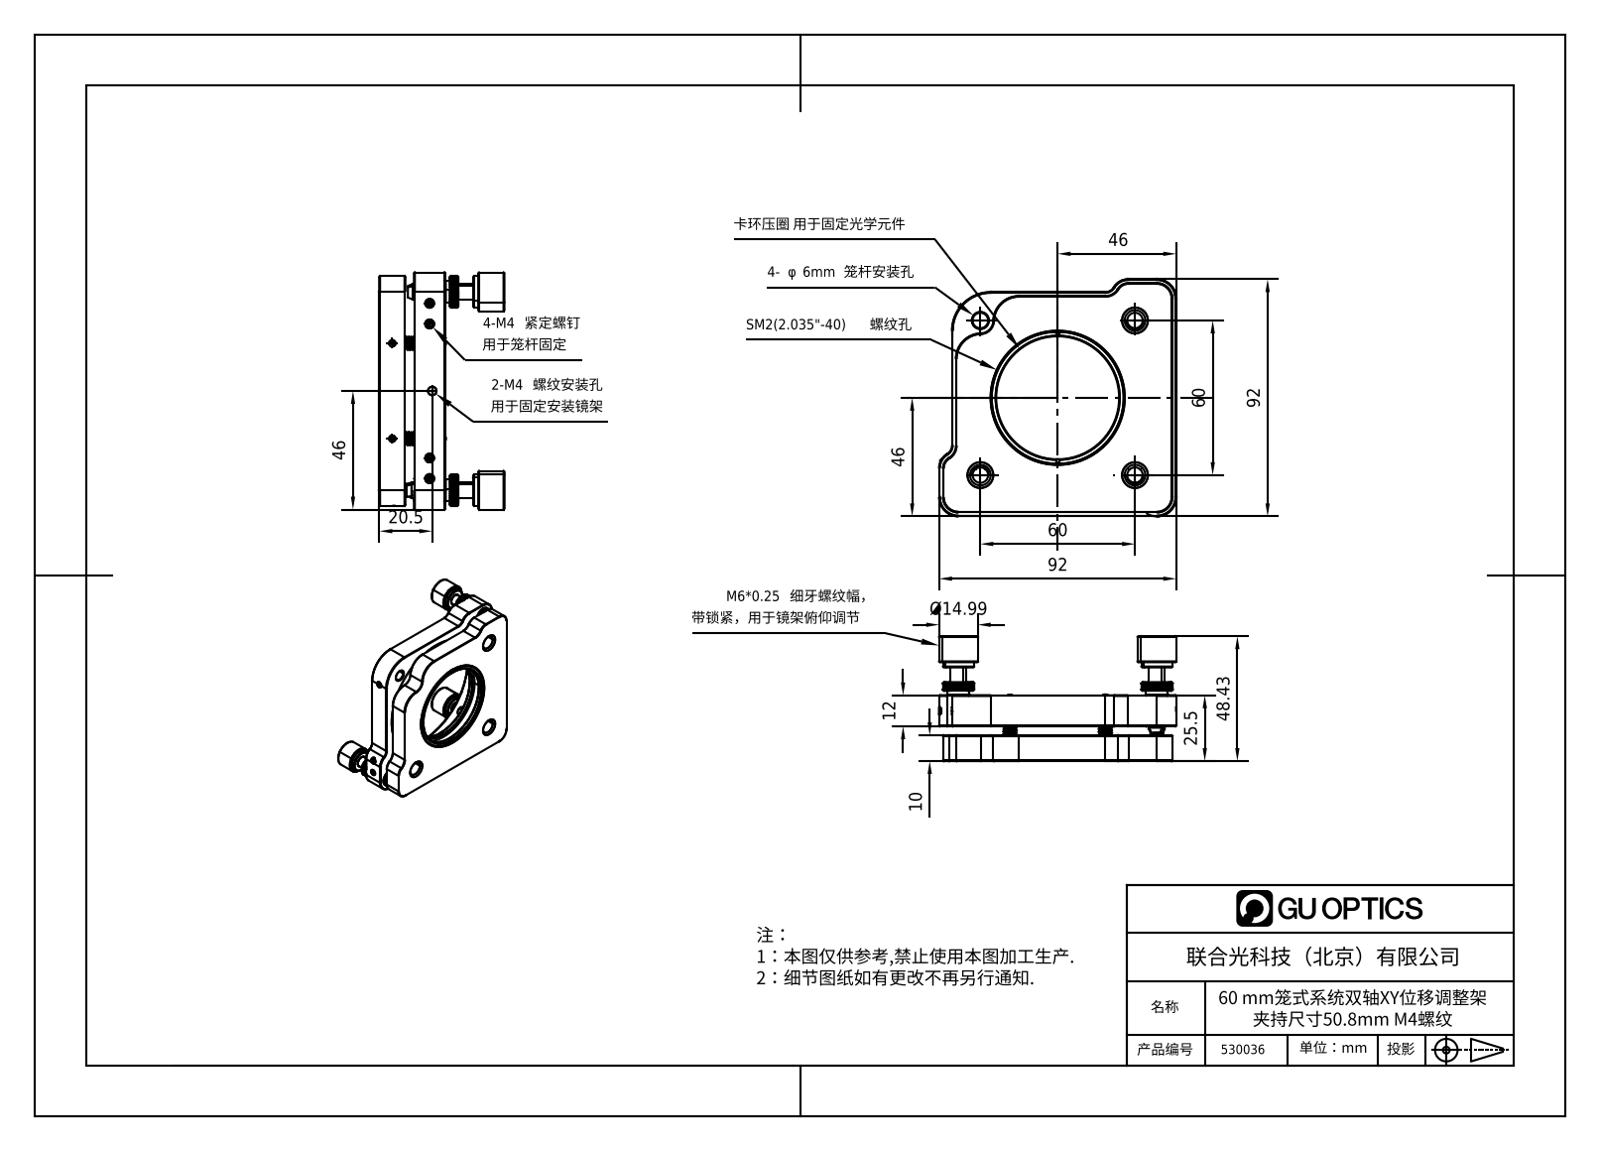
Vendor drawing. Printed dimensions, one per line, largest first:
92
92
60
60
48.43
46
46
46
25.5
20.5
Ø14.99
12
10
